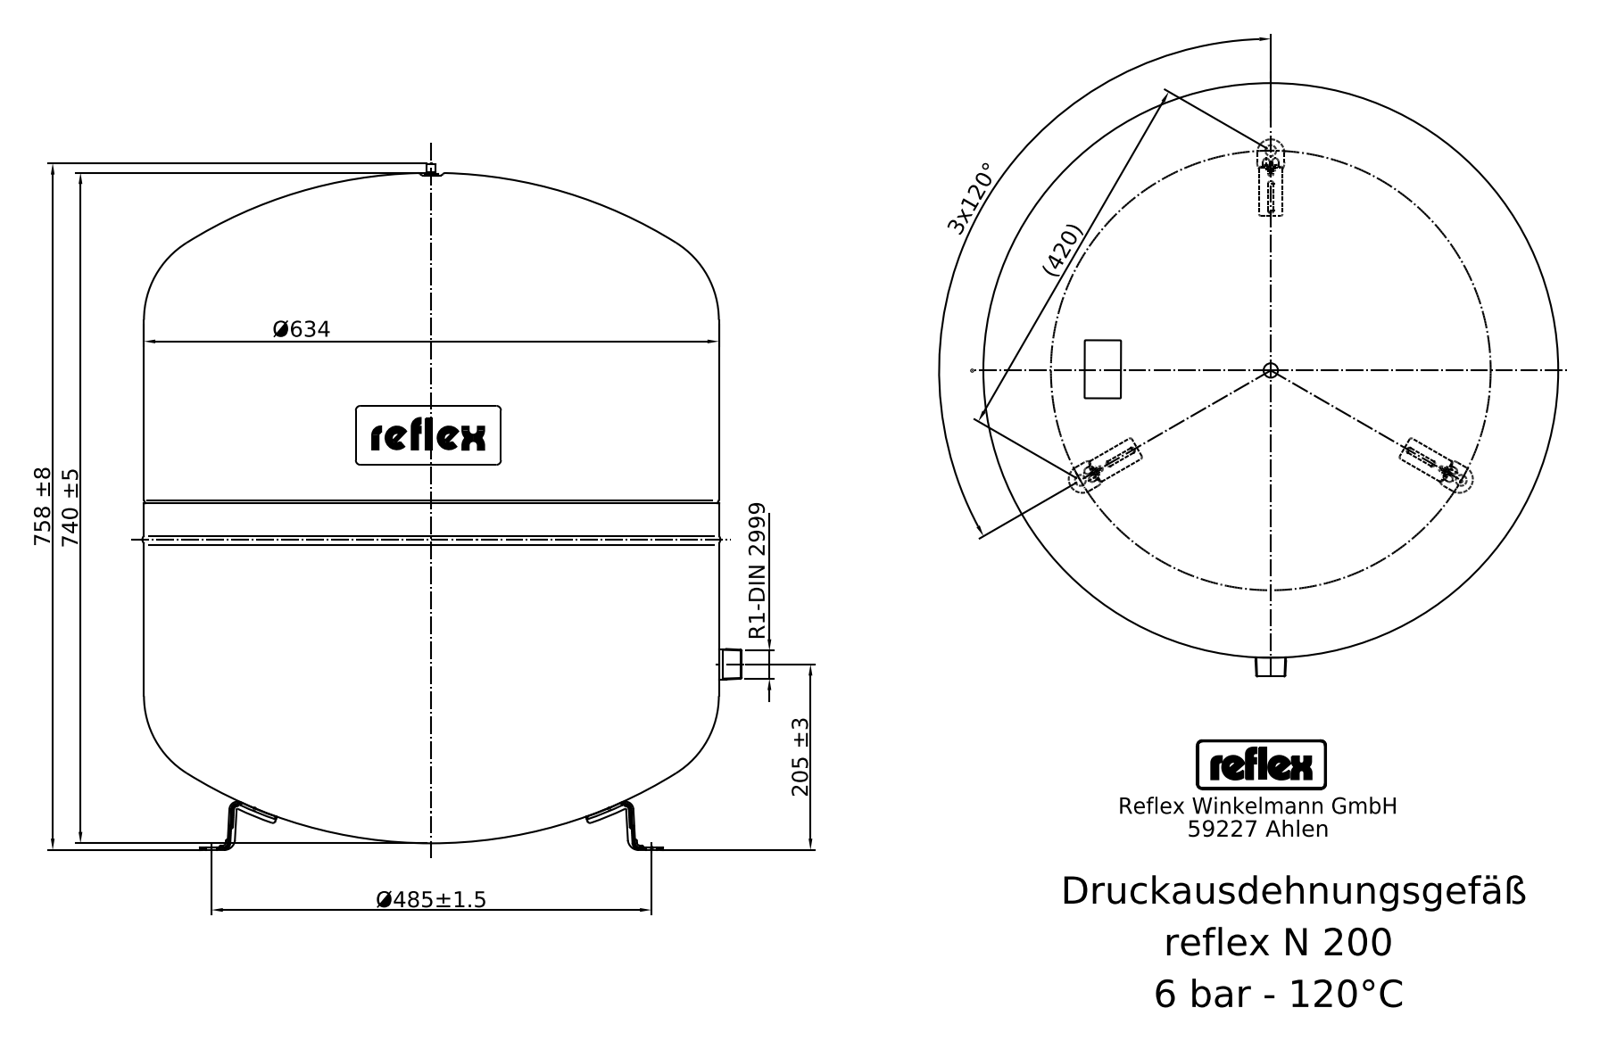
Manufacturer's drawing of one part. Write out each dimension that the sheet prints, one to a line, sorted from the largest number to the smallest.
758 ±8
740 ±5
Ø634
Ø485±1.5
(420)
205 ±3
3x120°
R1-DIN 2999
